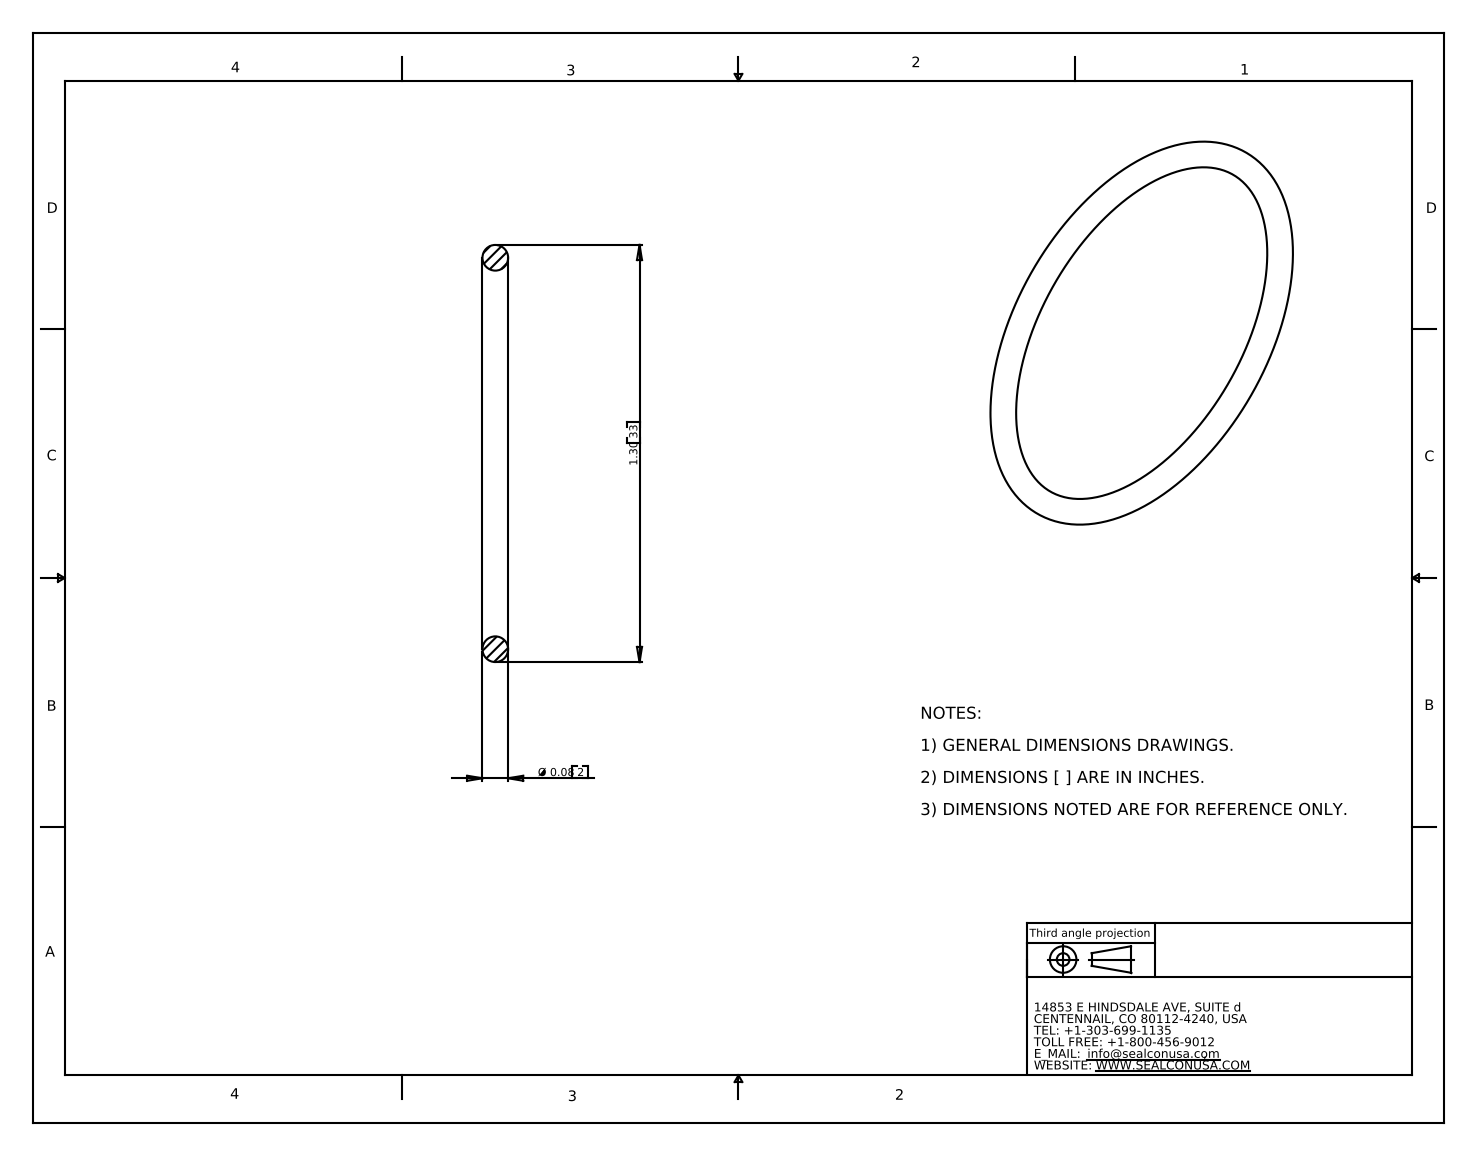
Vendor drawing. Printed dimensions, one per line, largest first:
1.30 33
Ø 0.08 2
